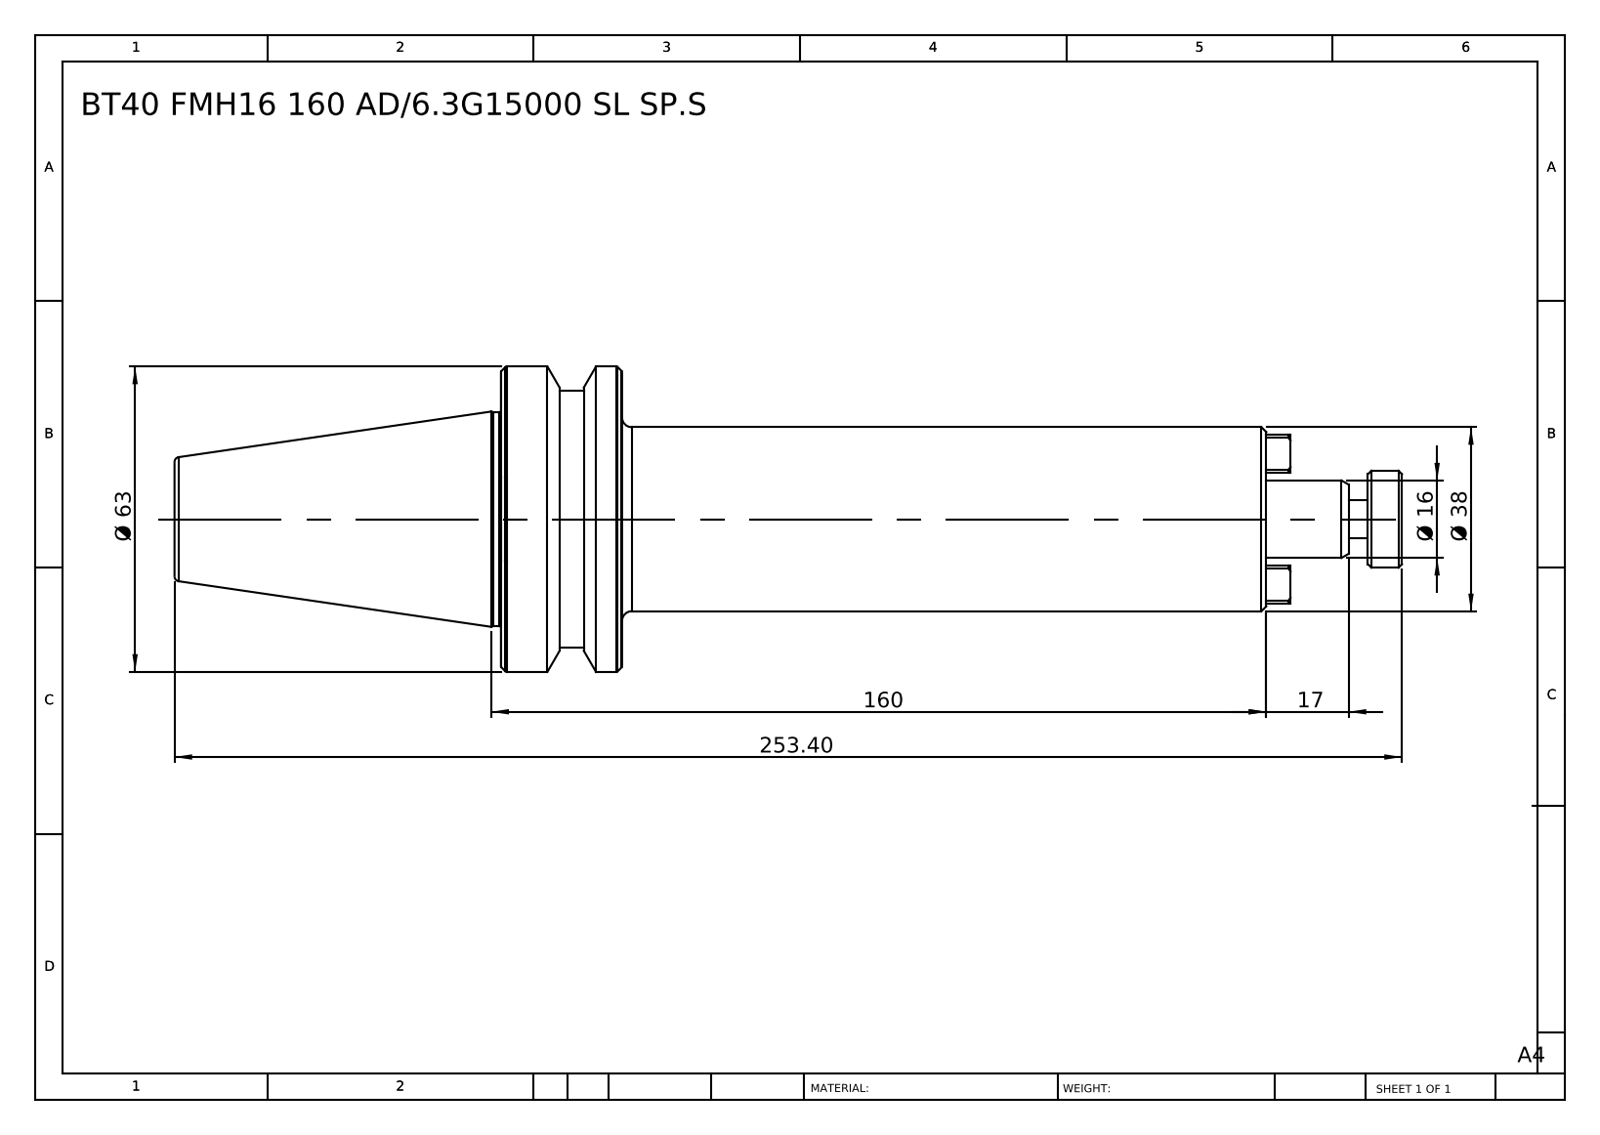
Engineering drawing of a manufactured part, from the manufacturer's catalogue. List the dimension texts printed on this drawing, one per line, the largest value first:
253.40
160
Ø 63
Ø 38
17
Ø 16
